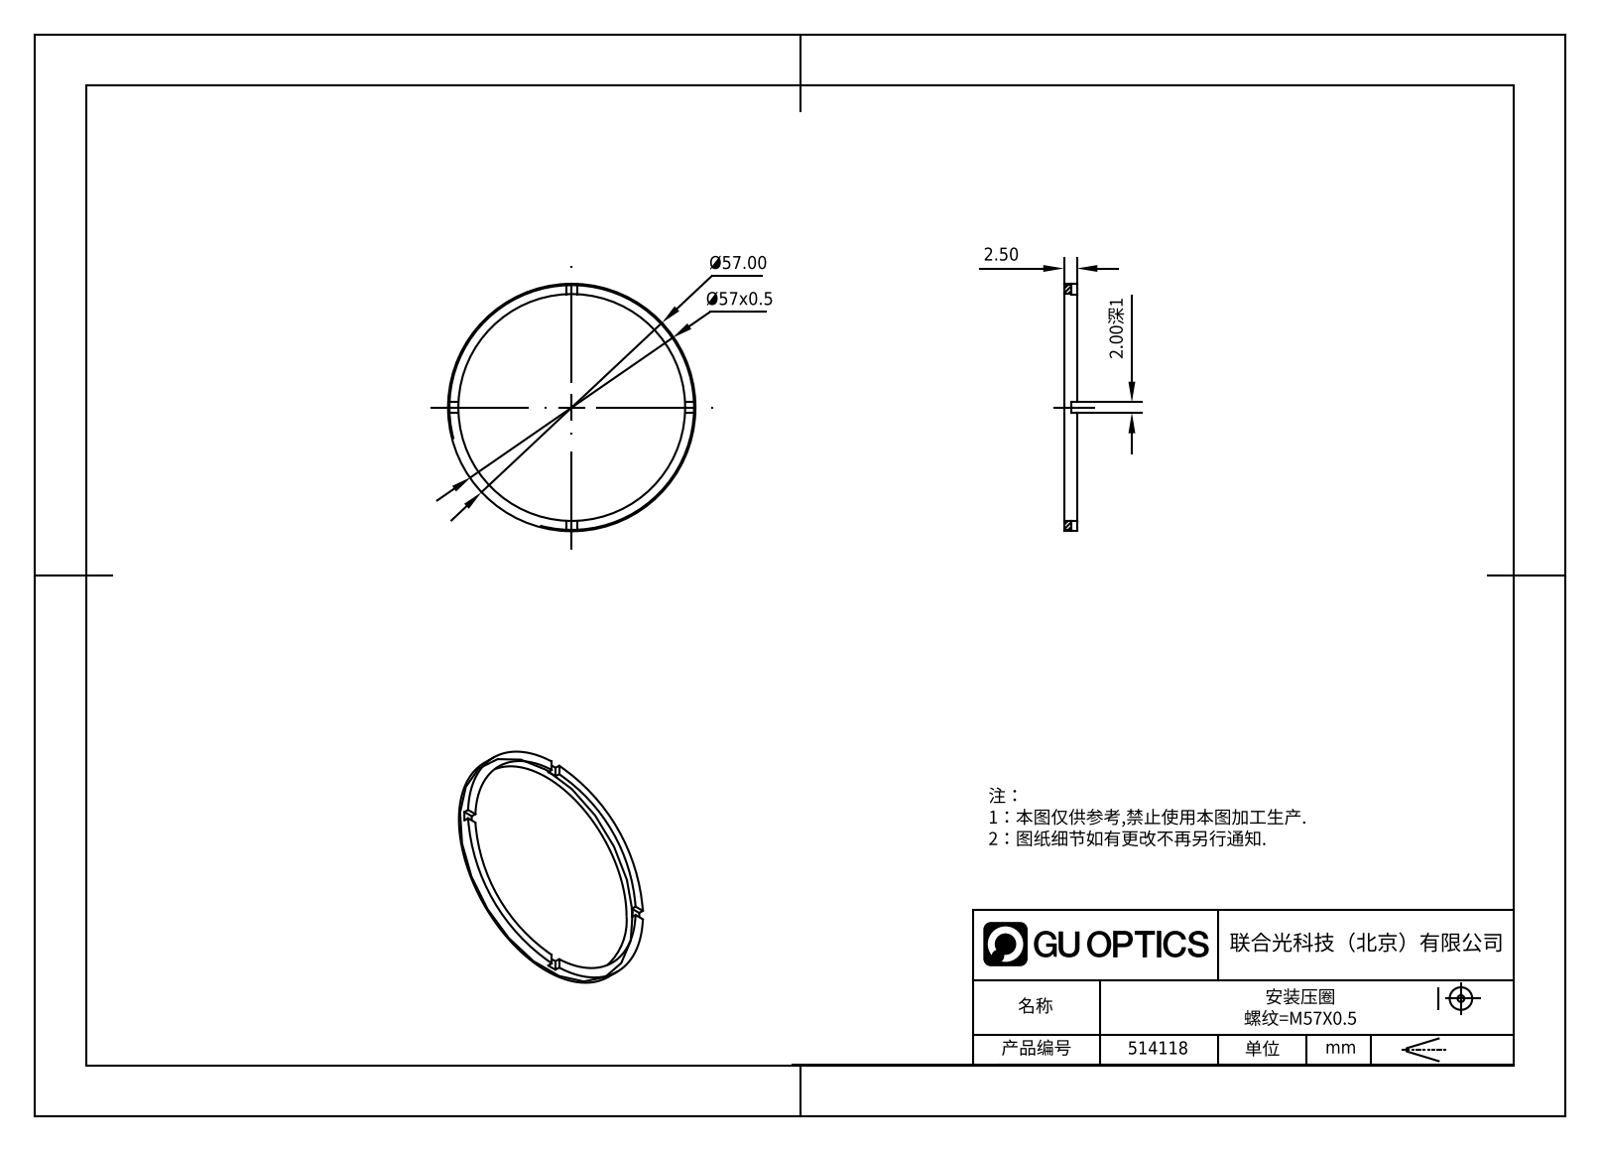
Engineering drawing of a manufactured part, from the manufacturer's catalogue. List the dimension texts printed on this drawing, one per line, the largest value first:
Ø57.00
Ø57x0.5
2.50
2.00深1
